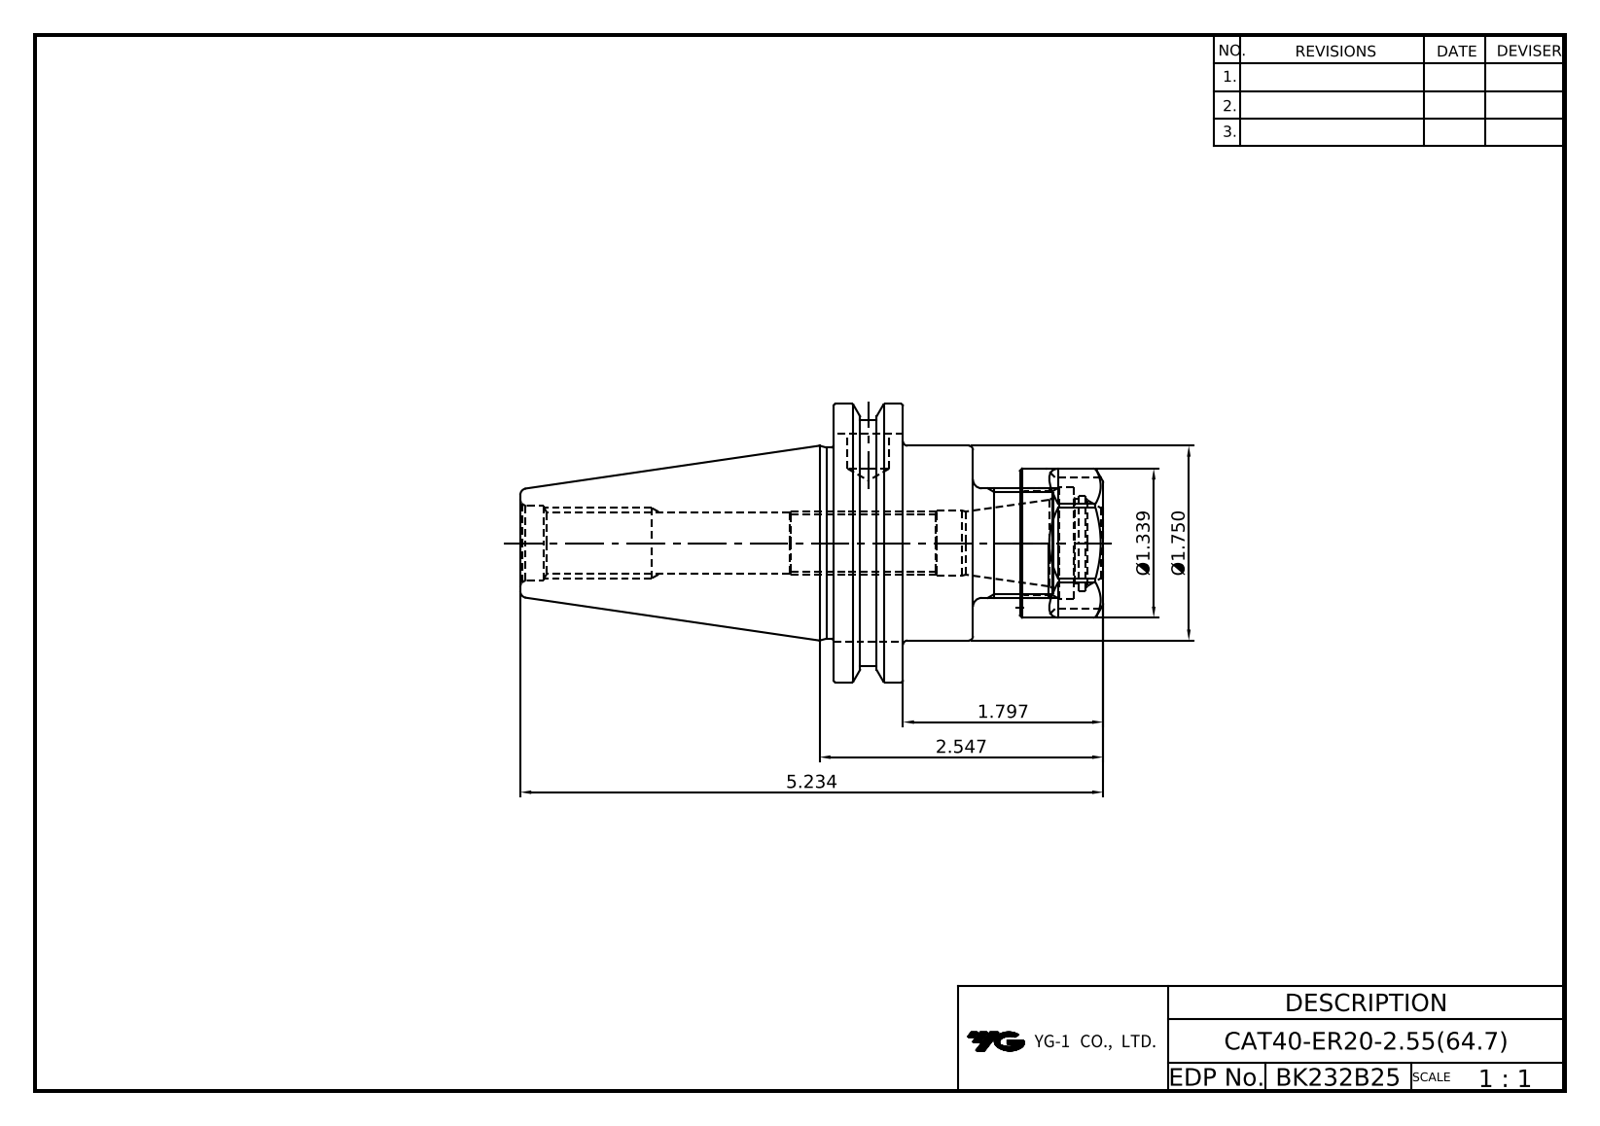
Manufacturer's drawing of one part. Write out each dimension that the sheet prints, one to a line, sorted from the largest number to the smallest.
5.234
2.547
1.797
Ø1.750
Ø1.339
